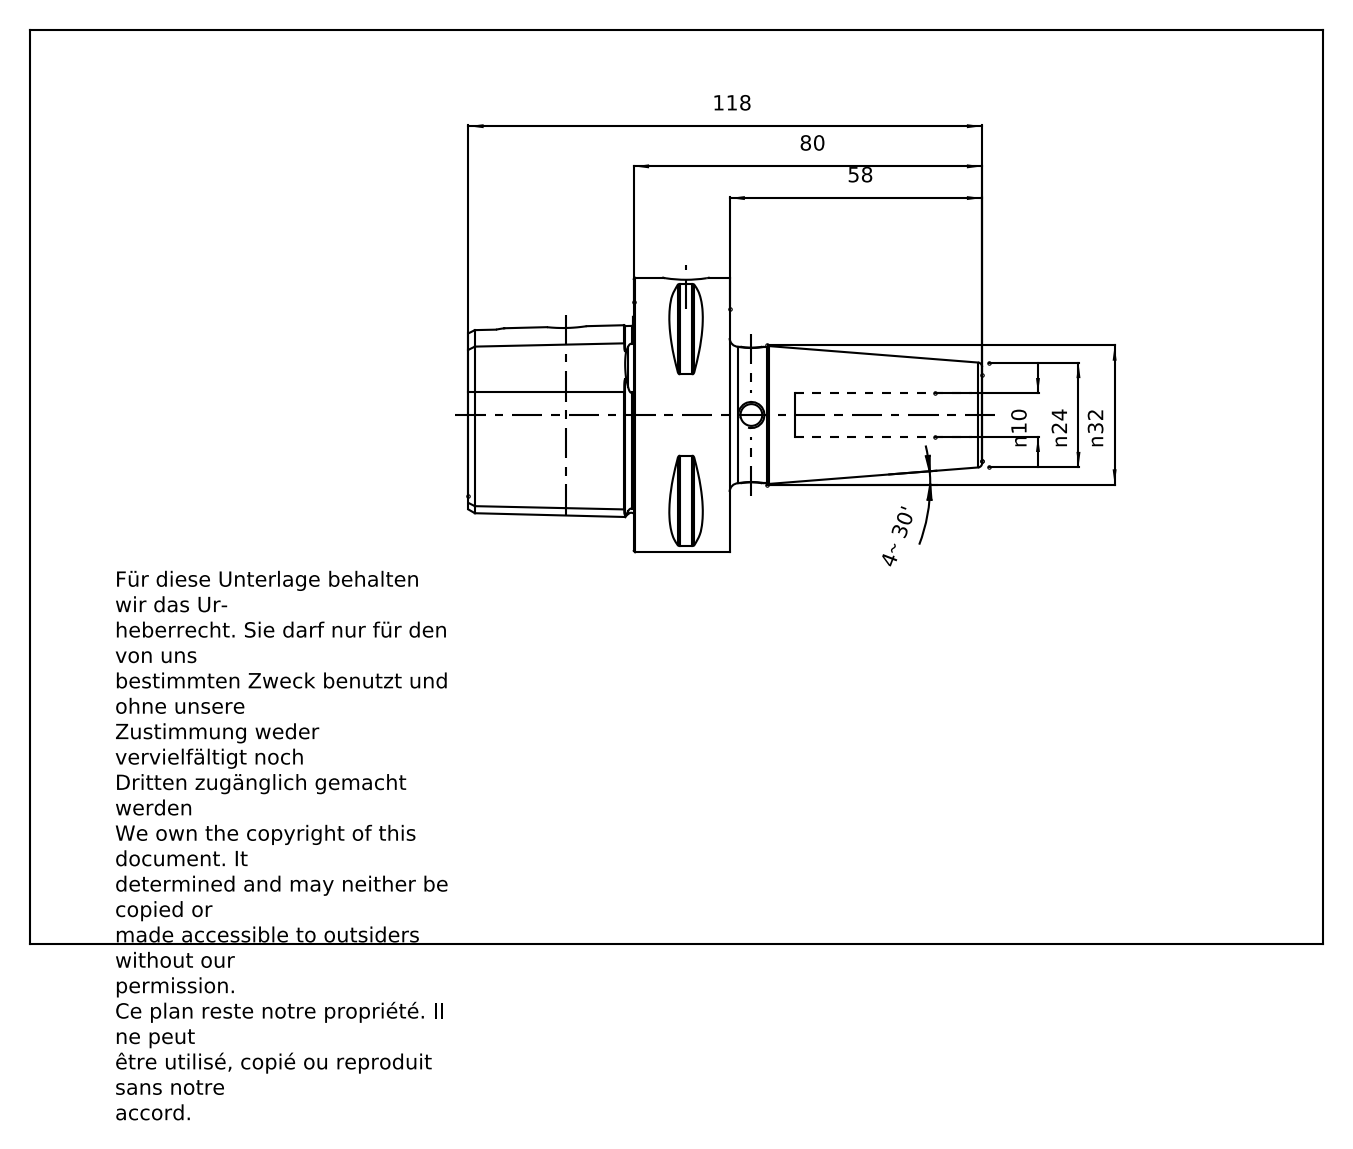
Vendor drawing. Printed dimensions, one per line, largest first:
118
80
58
n32
n24
n10
